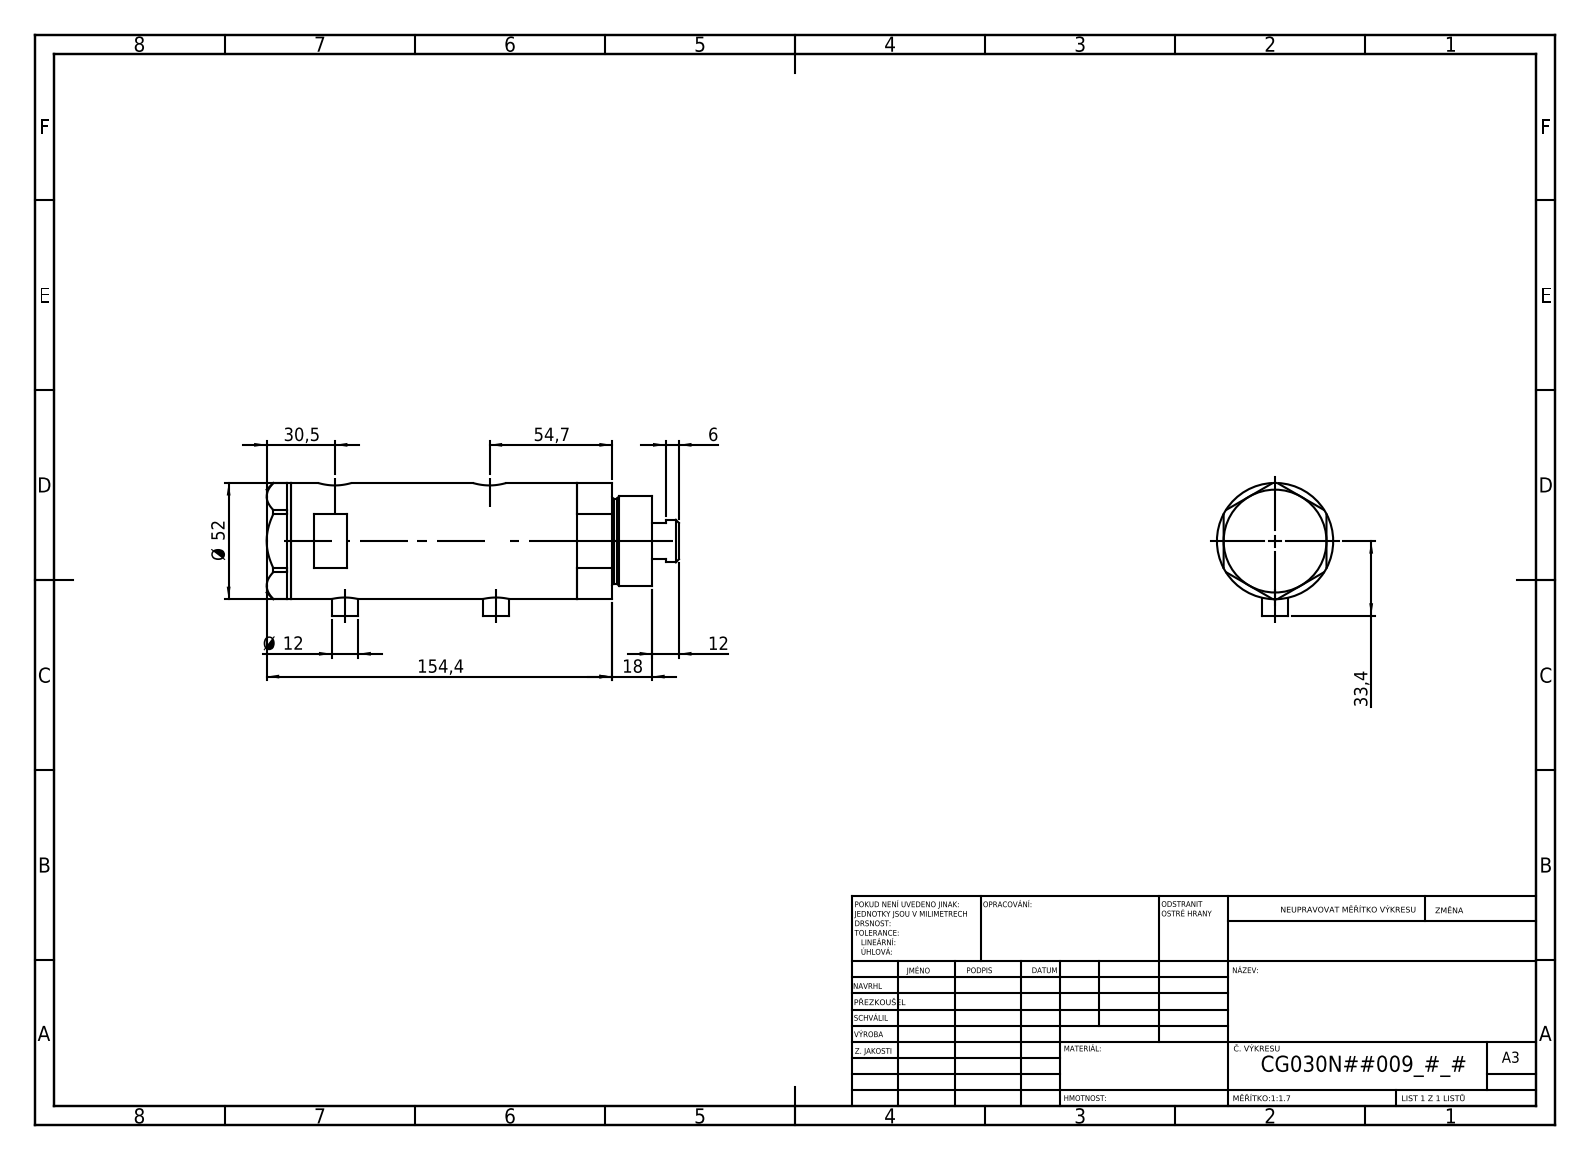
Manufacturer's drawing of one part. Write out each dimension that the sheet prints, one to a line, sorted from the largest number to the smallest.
154,4
54,7
Ø 52
33,4
30,5
18
12
Ø 12
6
